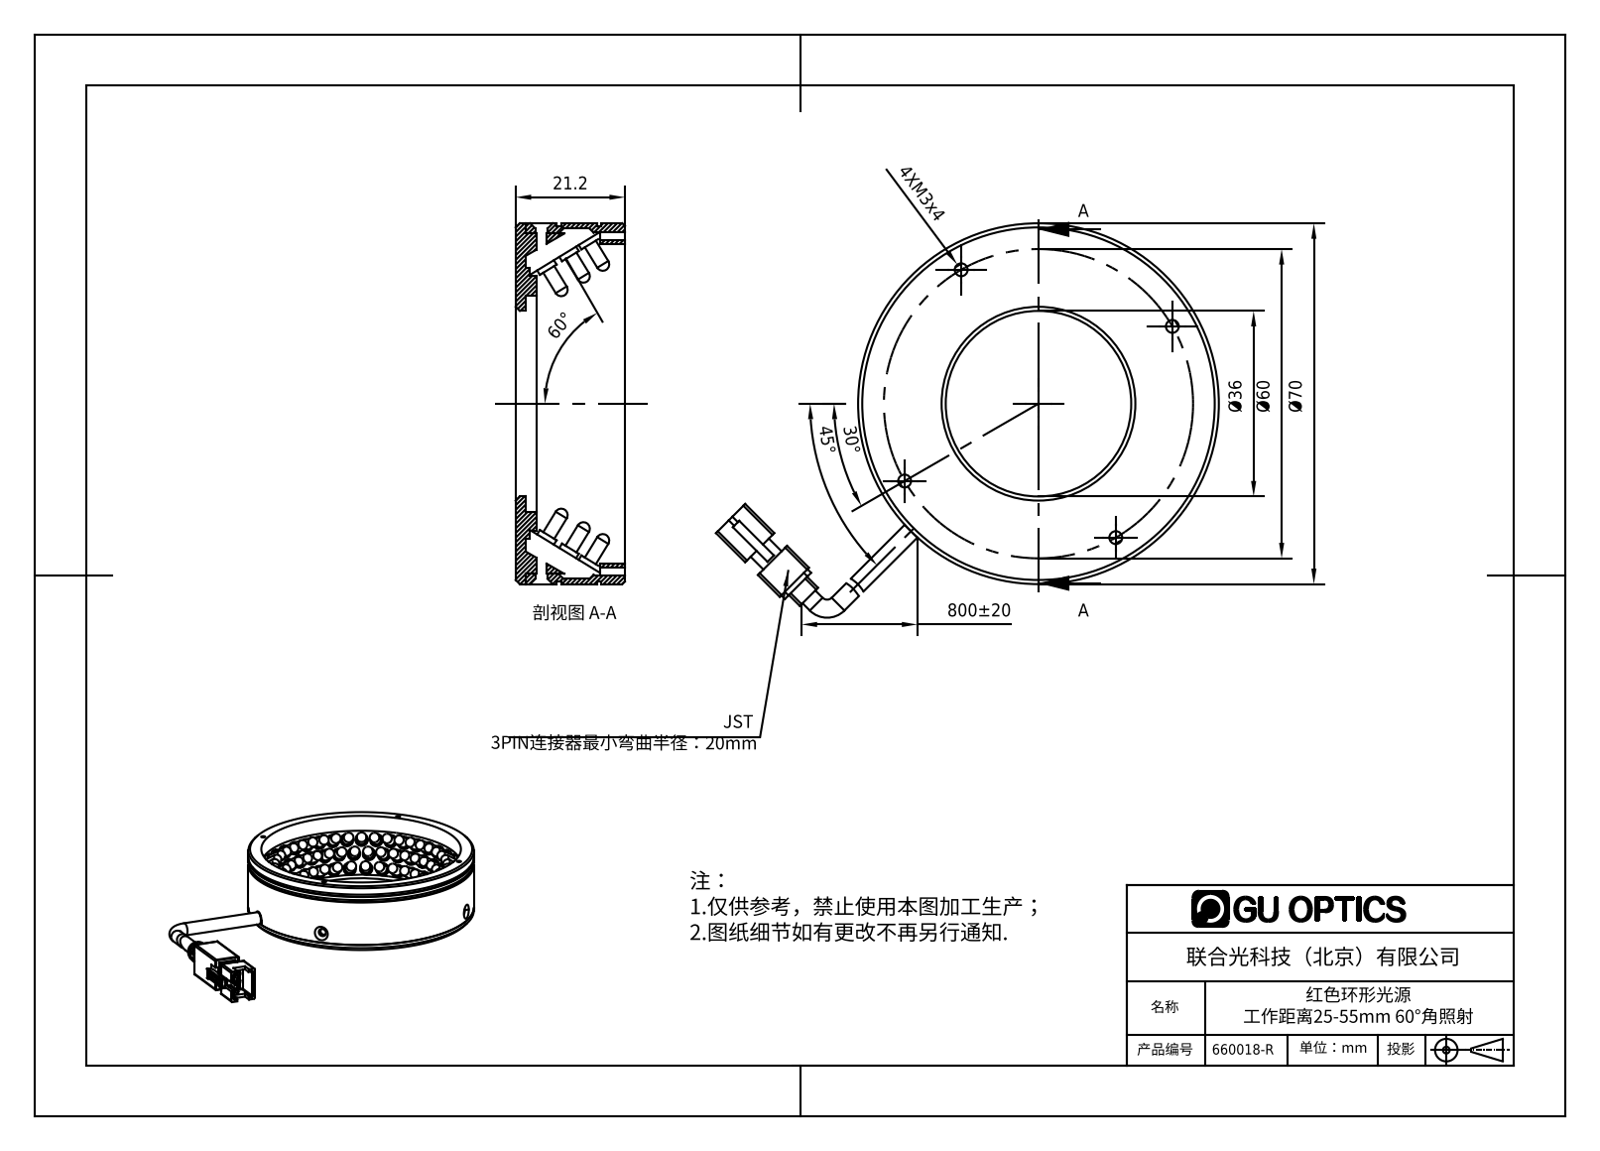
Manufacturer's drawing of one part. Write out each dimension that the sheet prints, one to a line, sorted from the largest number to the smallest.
800±20
Ø70
Ø60
60°
45°
Ø36
30°
21.2
4XM3x4
